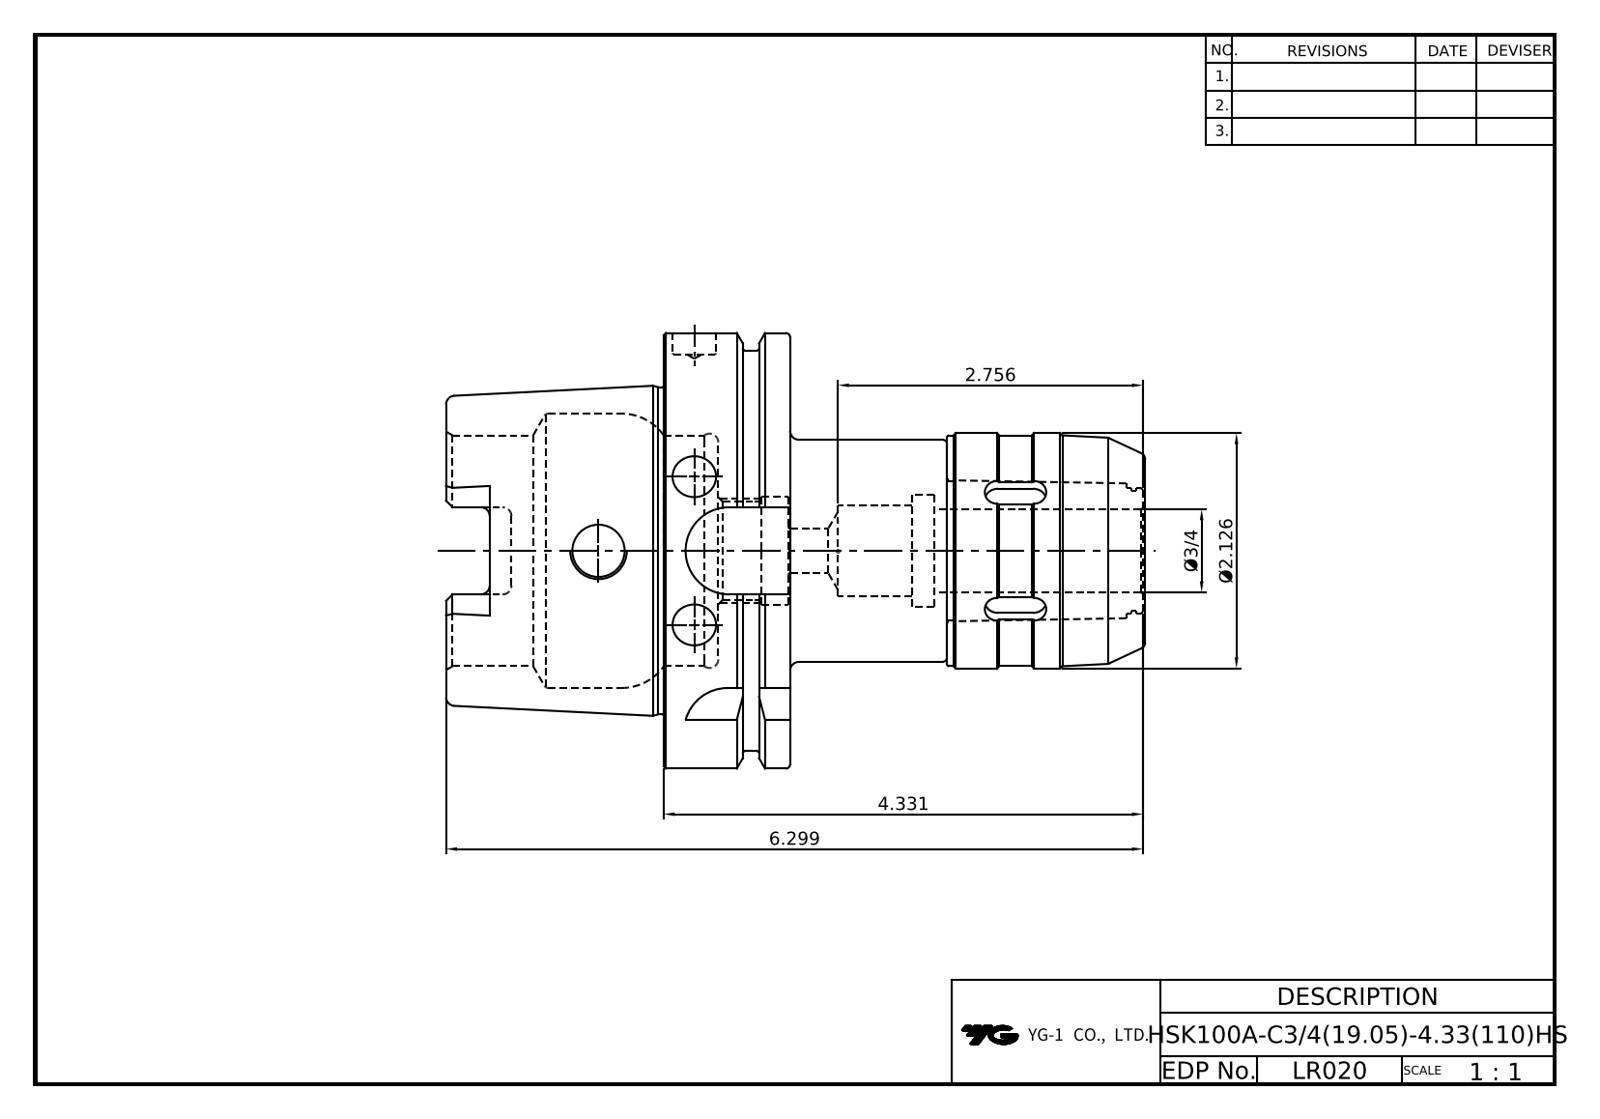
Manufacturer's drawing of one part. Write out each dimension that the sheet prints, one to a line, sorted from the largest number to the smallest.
6.299
4.331
2.756
Ø2.126
Ø3/4
